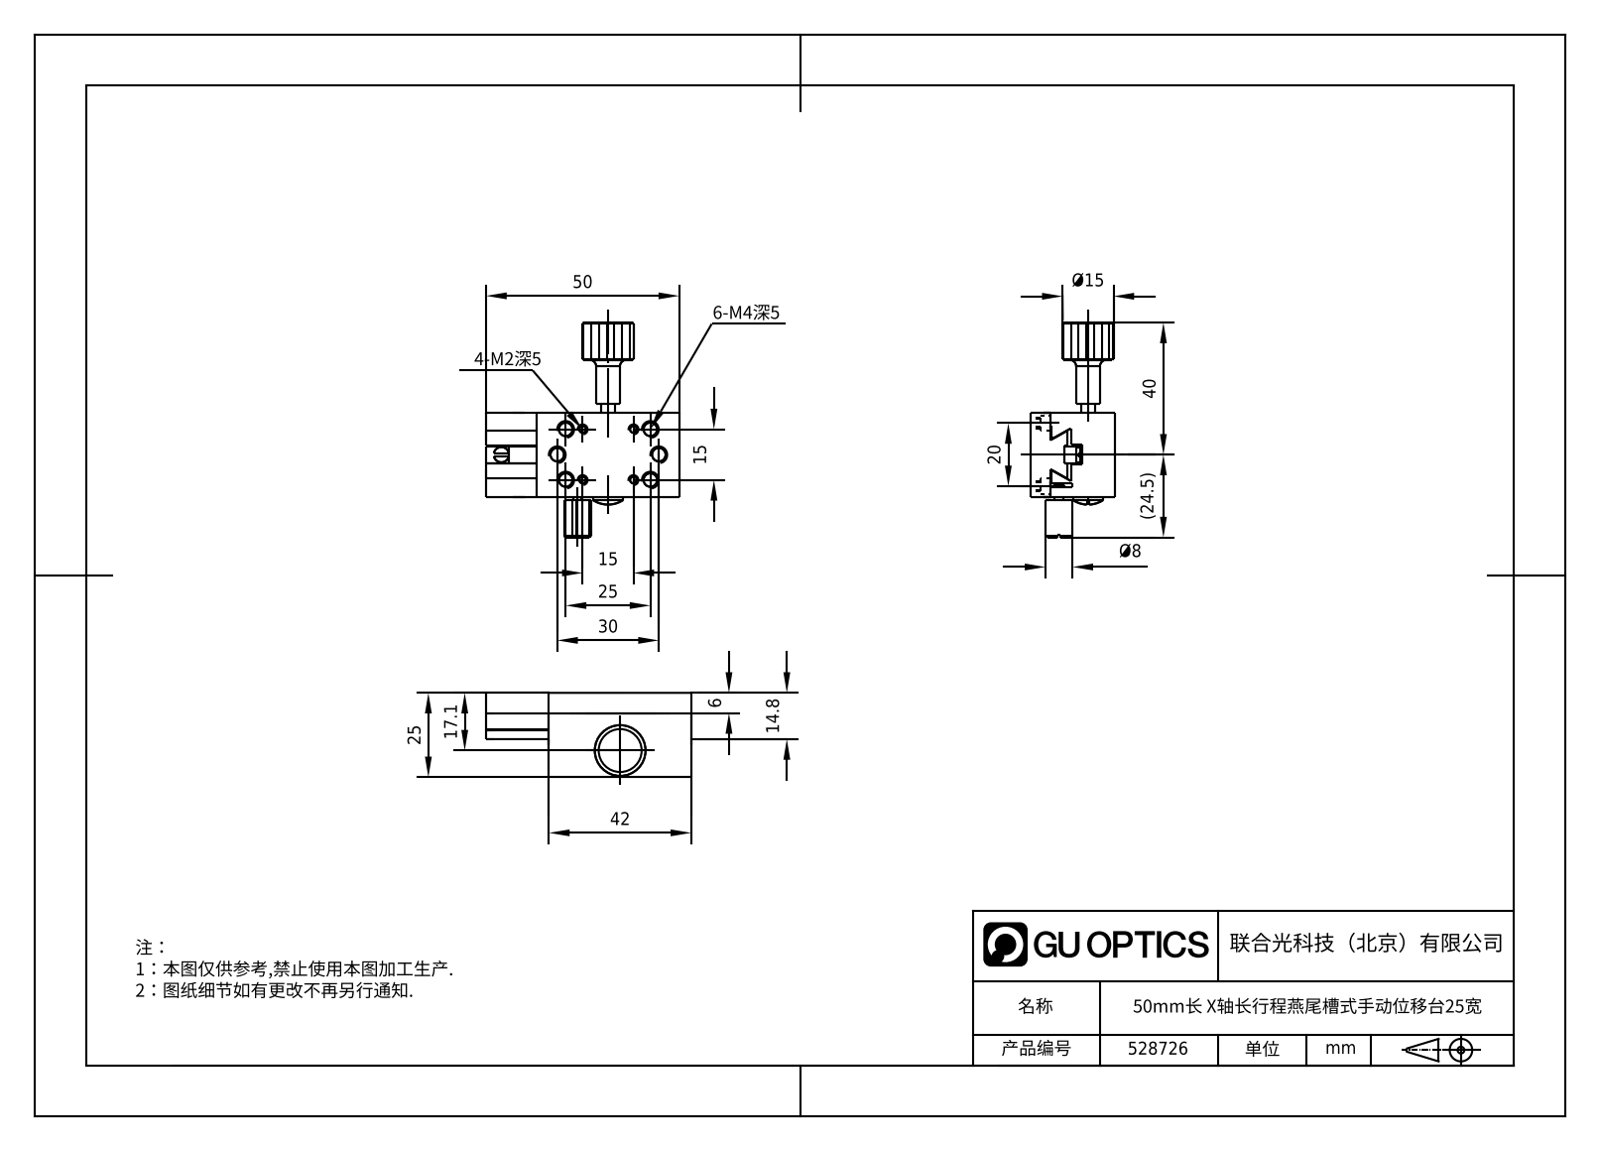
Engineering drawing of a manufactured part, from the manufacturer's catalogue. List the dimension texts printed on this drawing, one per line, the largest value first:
50
42
40
30
25
25
(24.5)
20
17.1
15
15
Ø15
14.8
Ø8
6
